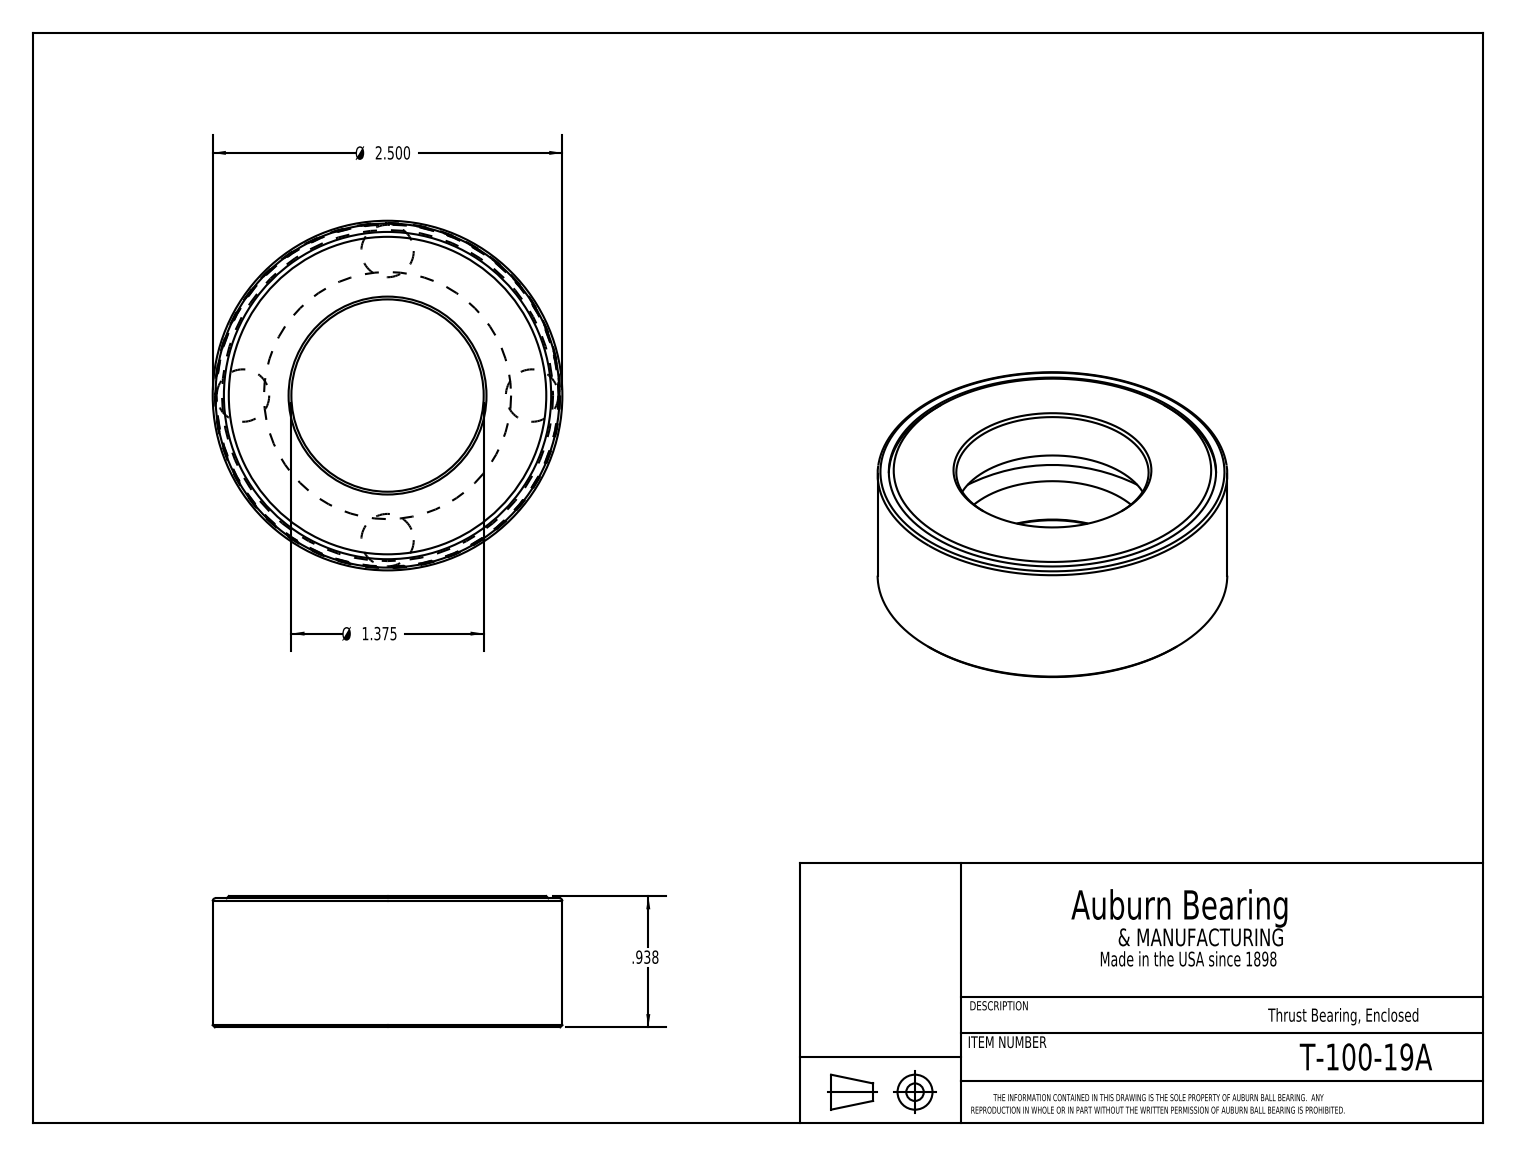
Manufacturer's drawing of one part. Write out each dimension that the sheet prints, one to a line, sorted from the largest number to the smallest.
Ø 2.500
Ø 1.375
.938
